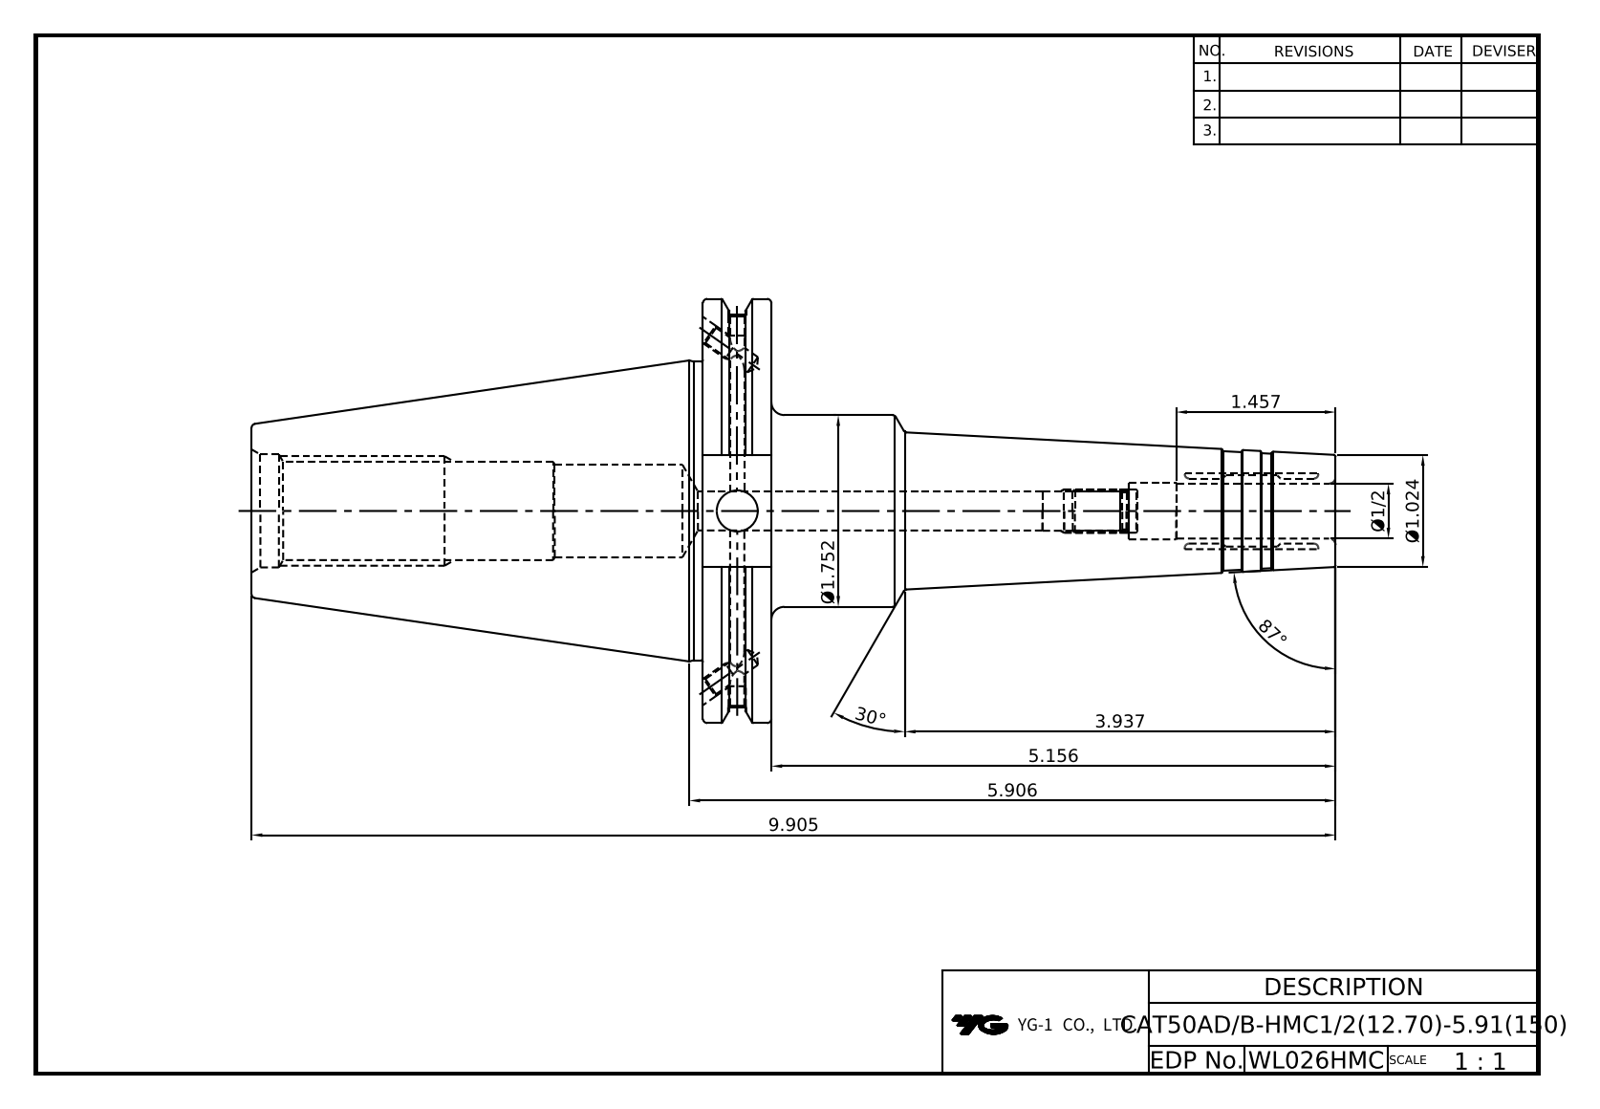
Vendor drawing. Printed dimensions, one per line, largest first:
87°
30°
9.905
5.906
5.156
3.937
Ø1.752
1.457
Ø1.024
Ø1/2
